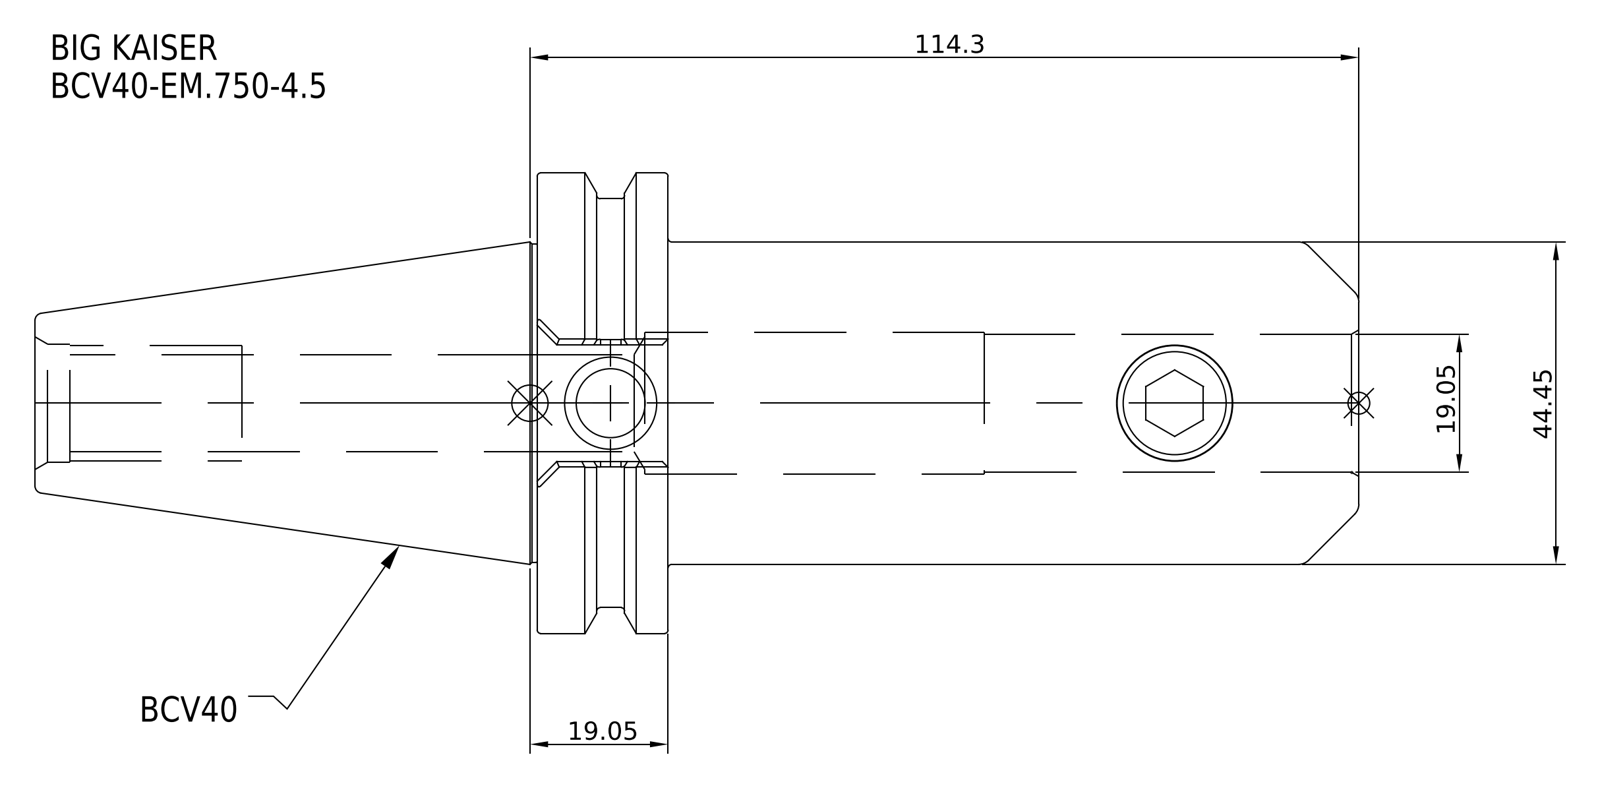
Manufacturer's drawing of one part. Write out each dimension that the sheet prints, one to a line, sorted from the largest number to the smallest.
114.3
44.45
19.05
19.05
